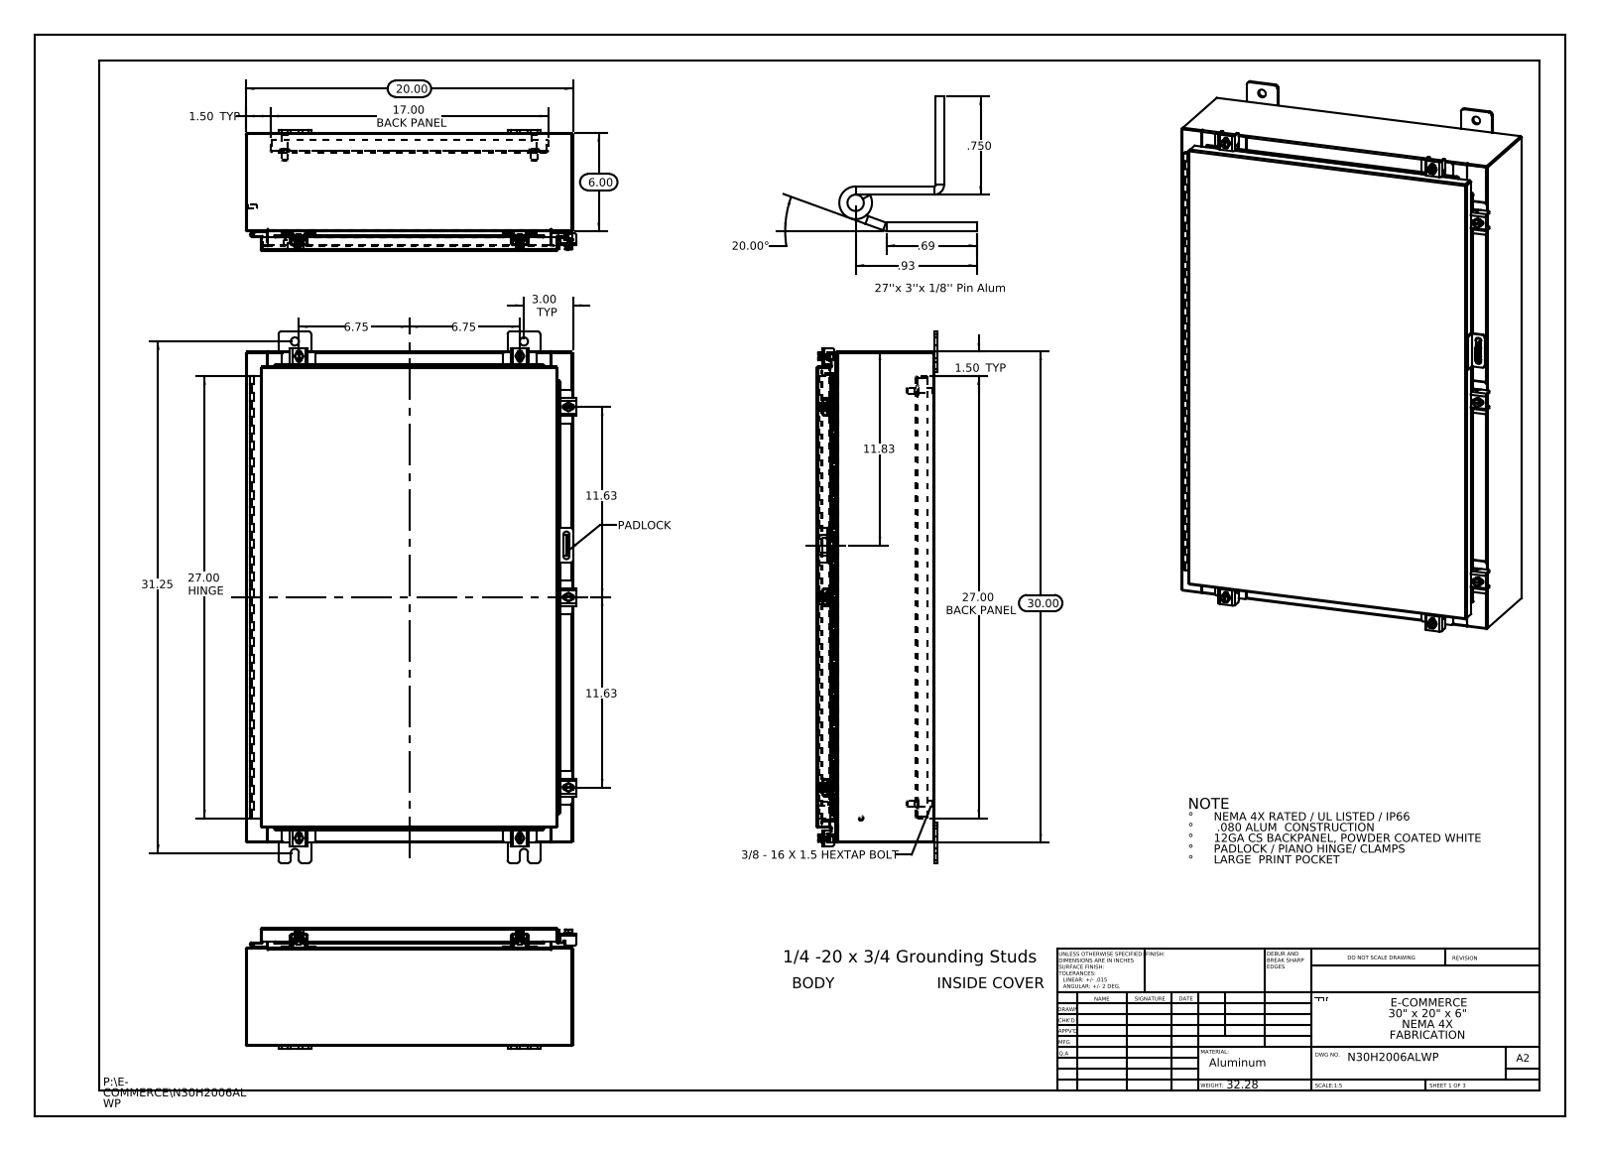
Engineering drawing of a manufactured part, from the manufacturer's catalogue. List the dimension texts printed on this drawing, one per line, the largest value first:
31.25
30.00
27.00 HINGE
27.00 BACK PANEL
20.00
20.00°
17.00 BACK PANEL
11.83
11.63
11.63
6.75
6.75
6.00
3.00 TYP
1.50 TYP
1.50 TYP
.93
.750
.69
